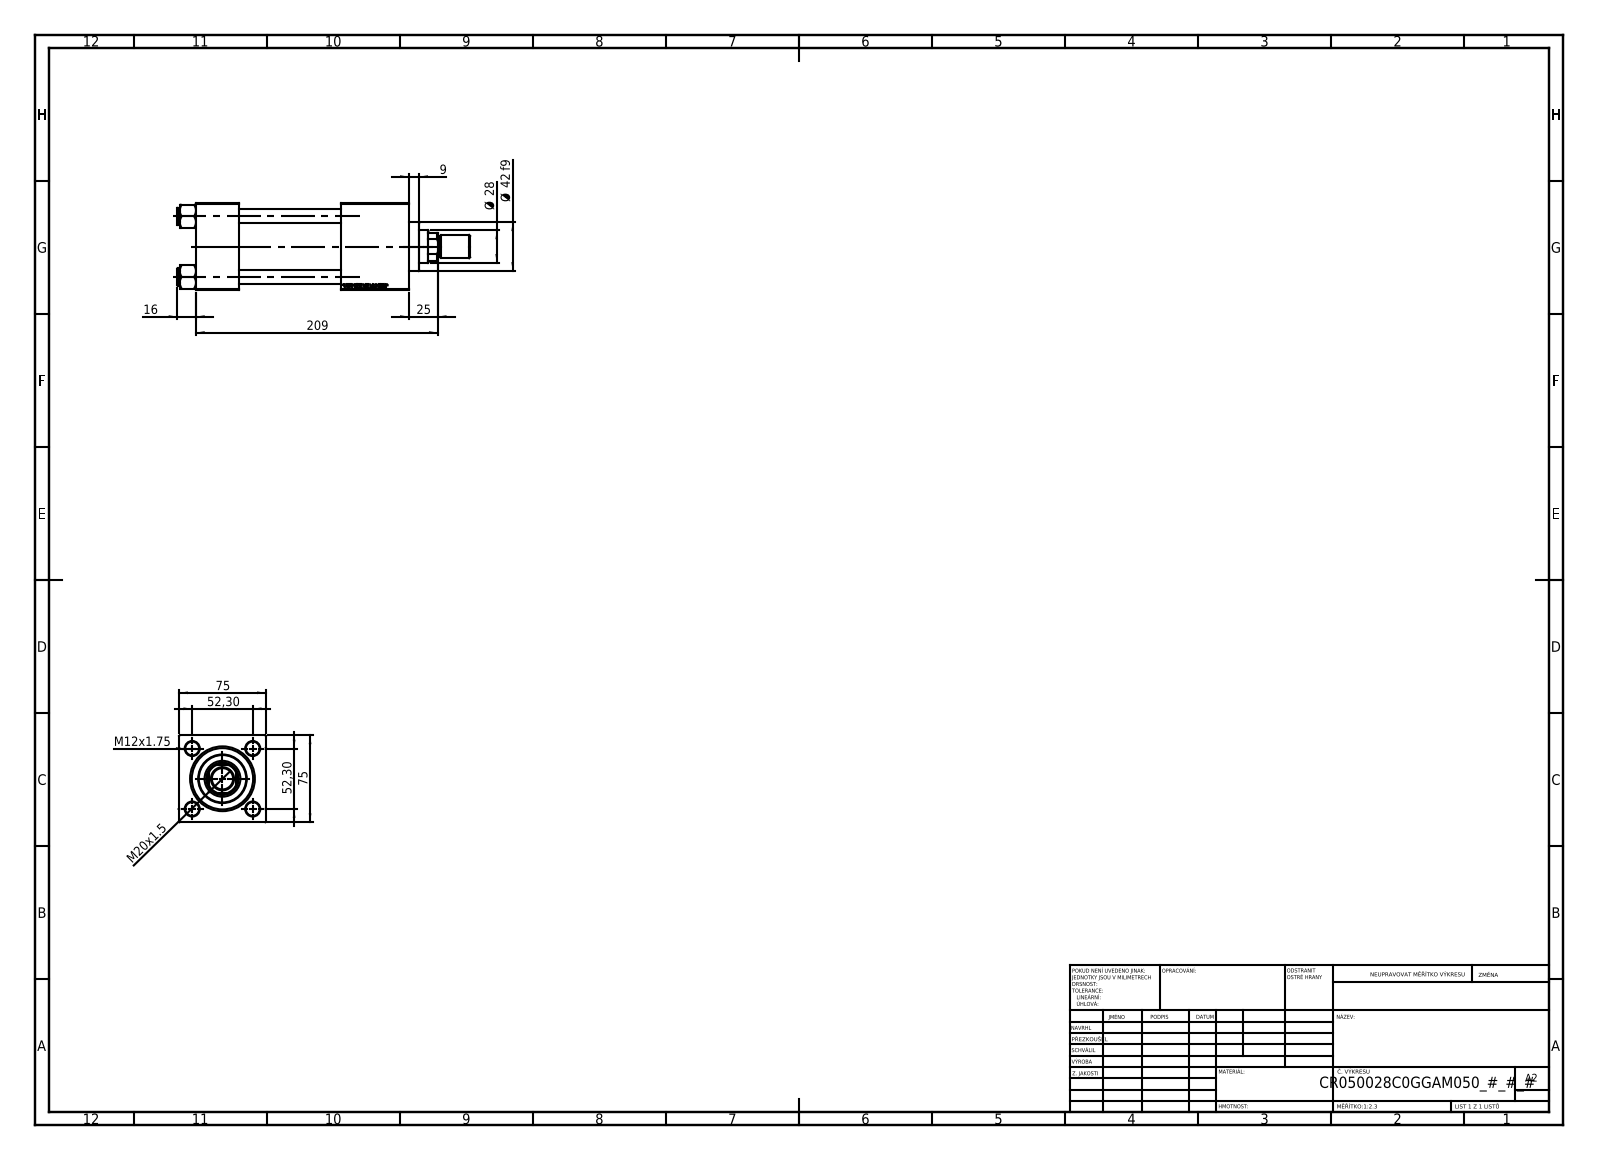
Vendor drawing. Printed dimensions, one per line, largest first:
209
75
75
52,30
52,30
Ø 42 f9
Ø 28
25
M20x1.5
16
M12x1.75
9
